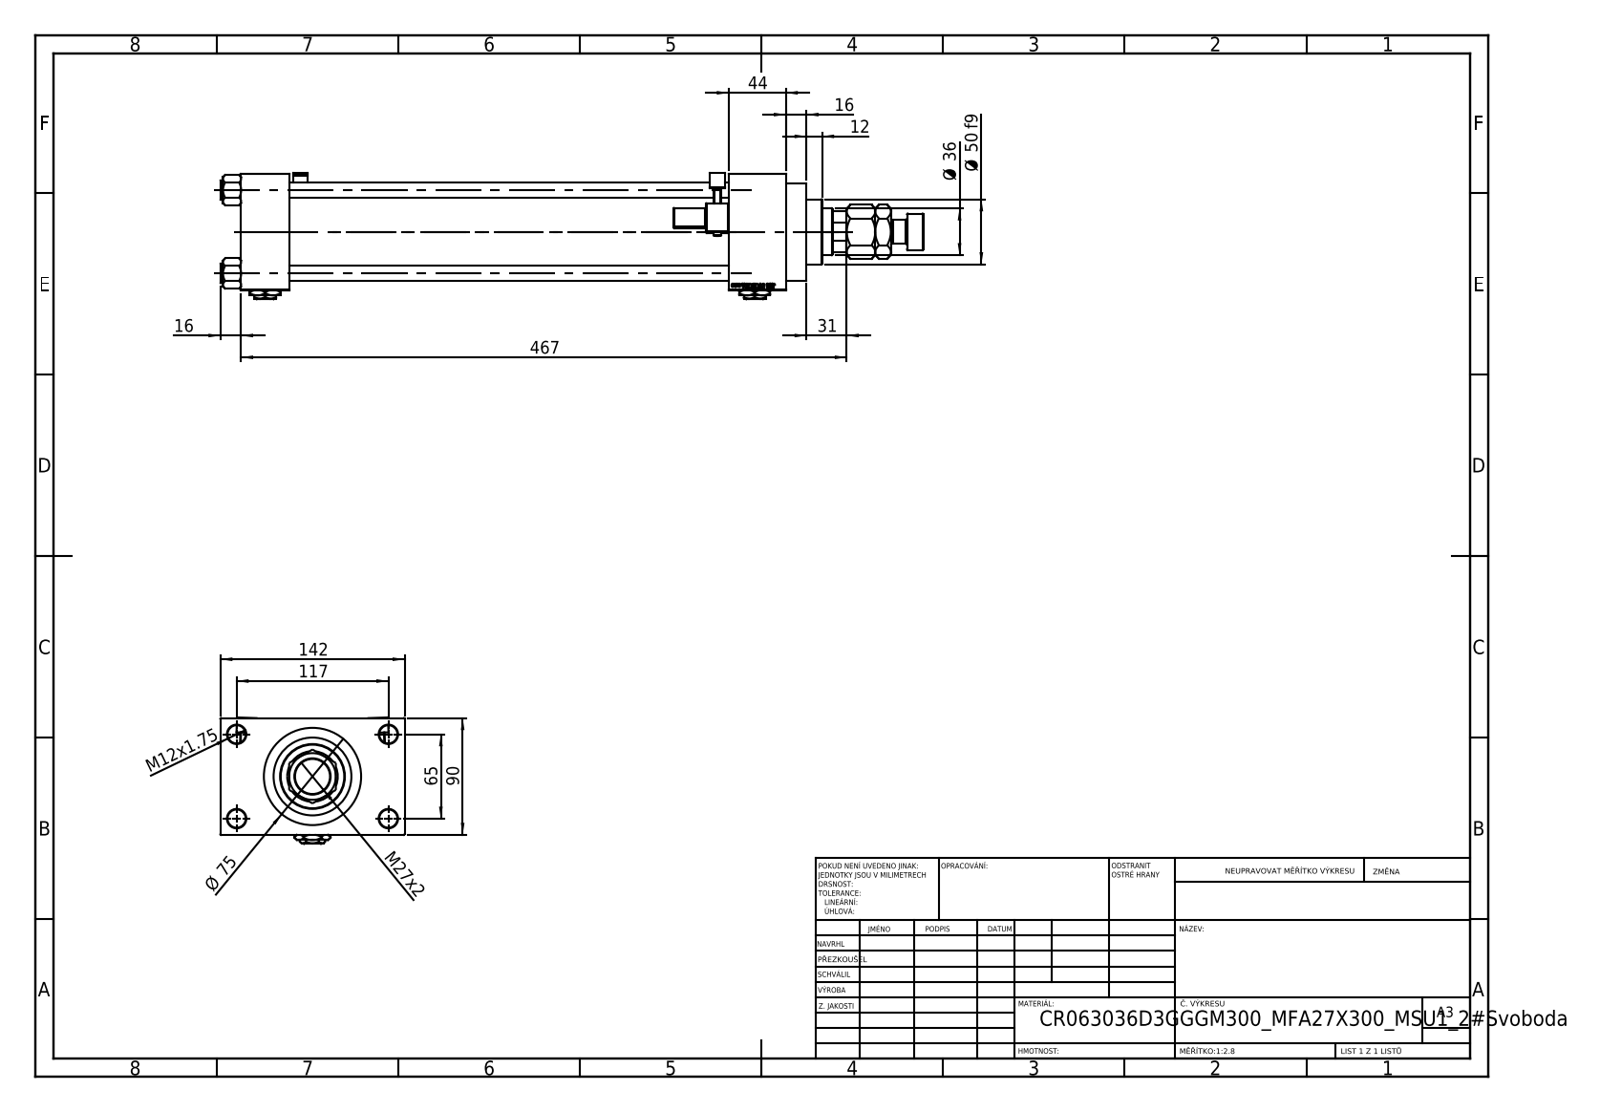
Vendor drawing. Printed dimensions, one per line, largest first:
467
142
117
90
Ø 75
65
Ø 50 f9
44
Ø 36
31
M27x2
16
16
12
M12x1.75
